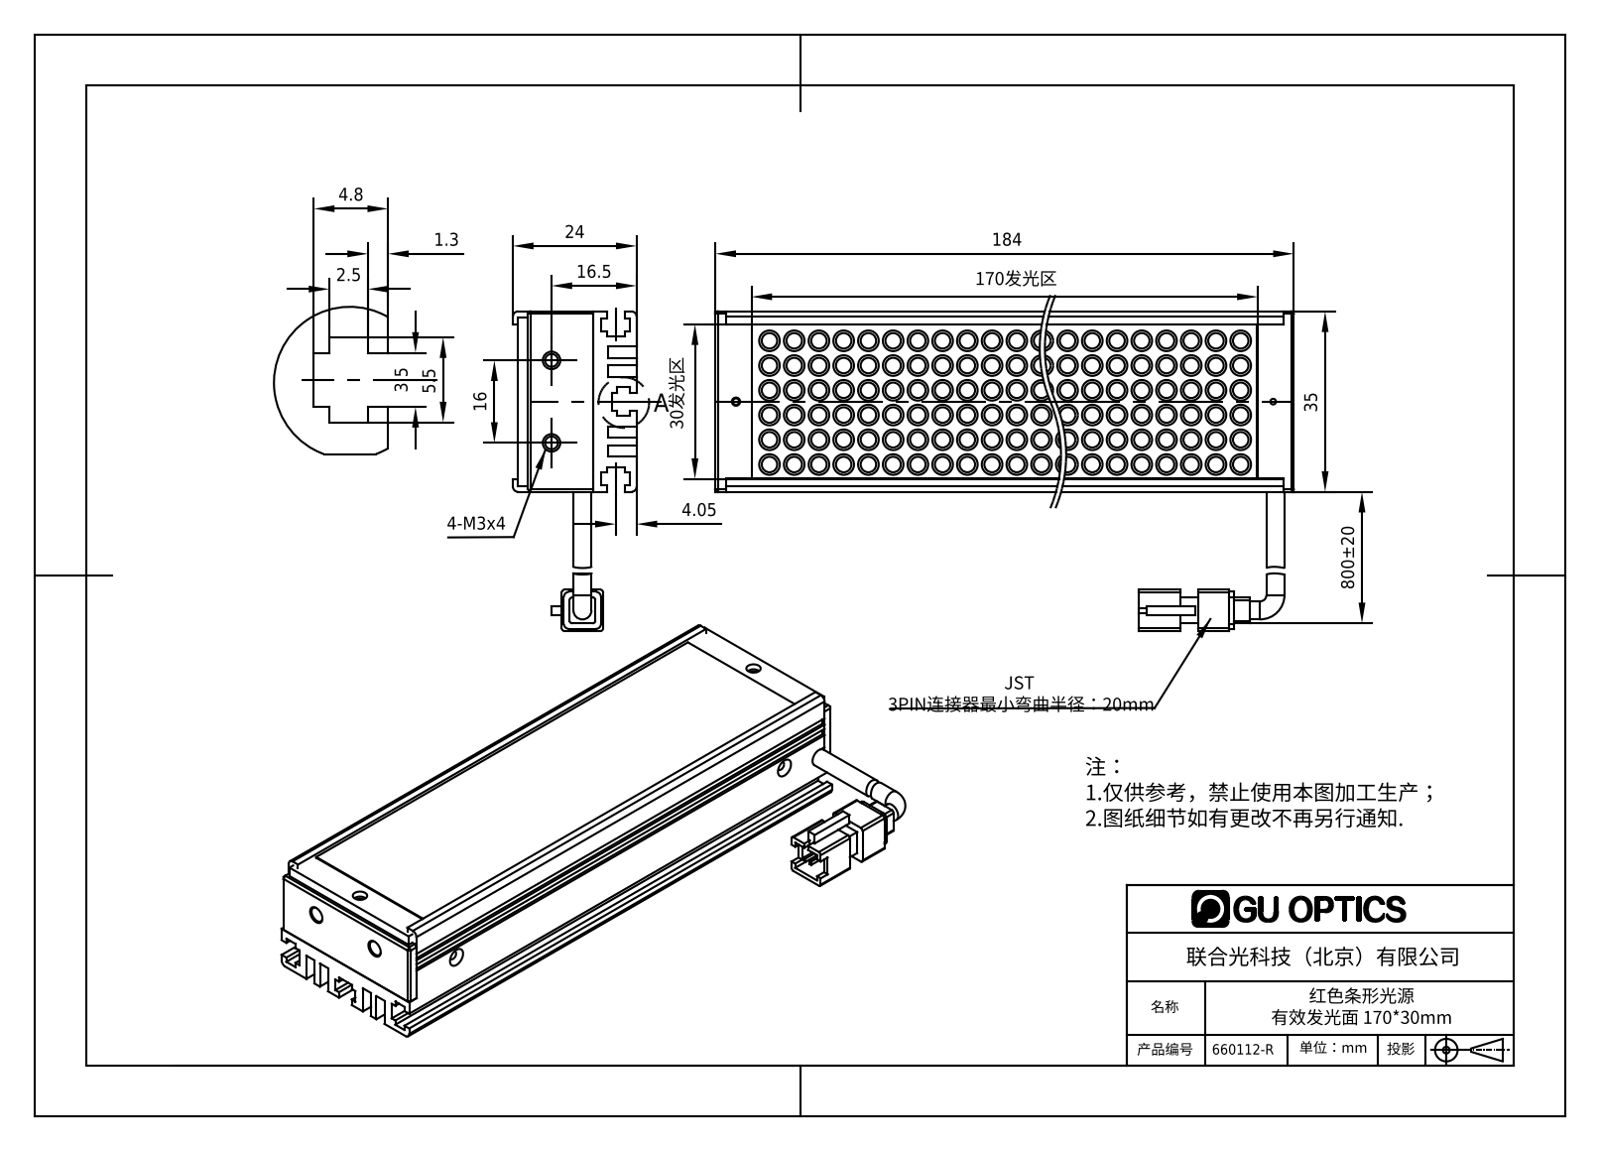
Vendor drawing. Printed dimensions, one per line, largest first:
800±20
184
170发光区
35
30发光区
24
16.5
16
5.5
4.8
4.05
3.5
2.5
1.3
